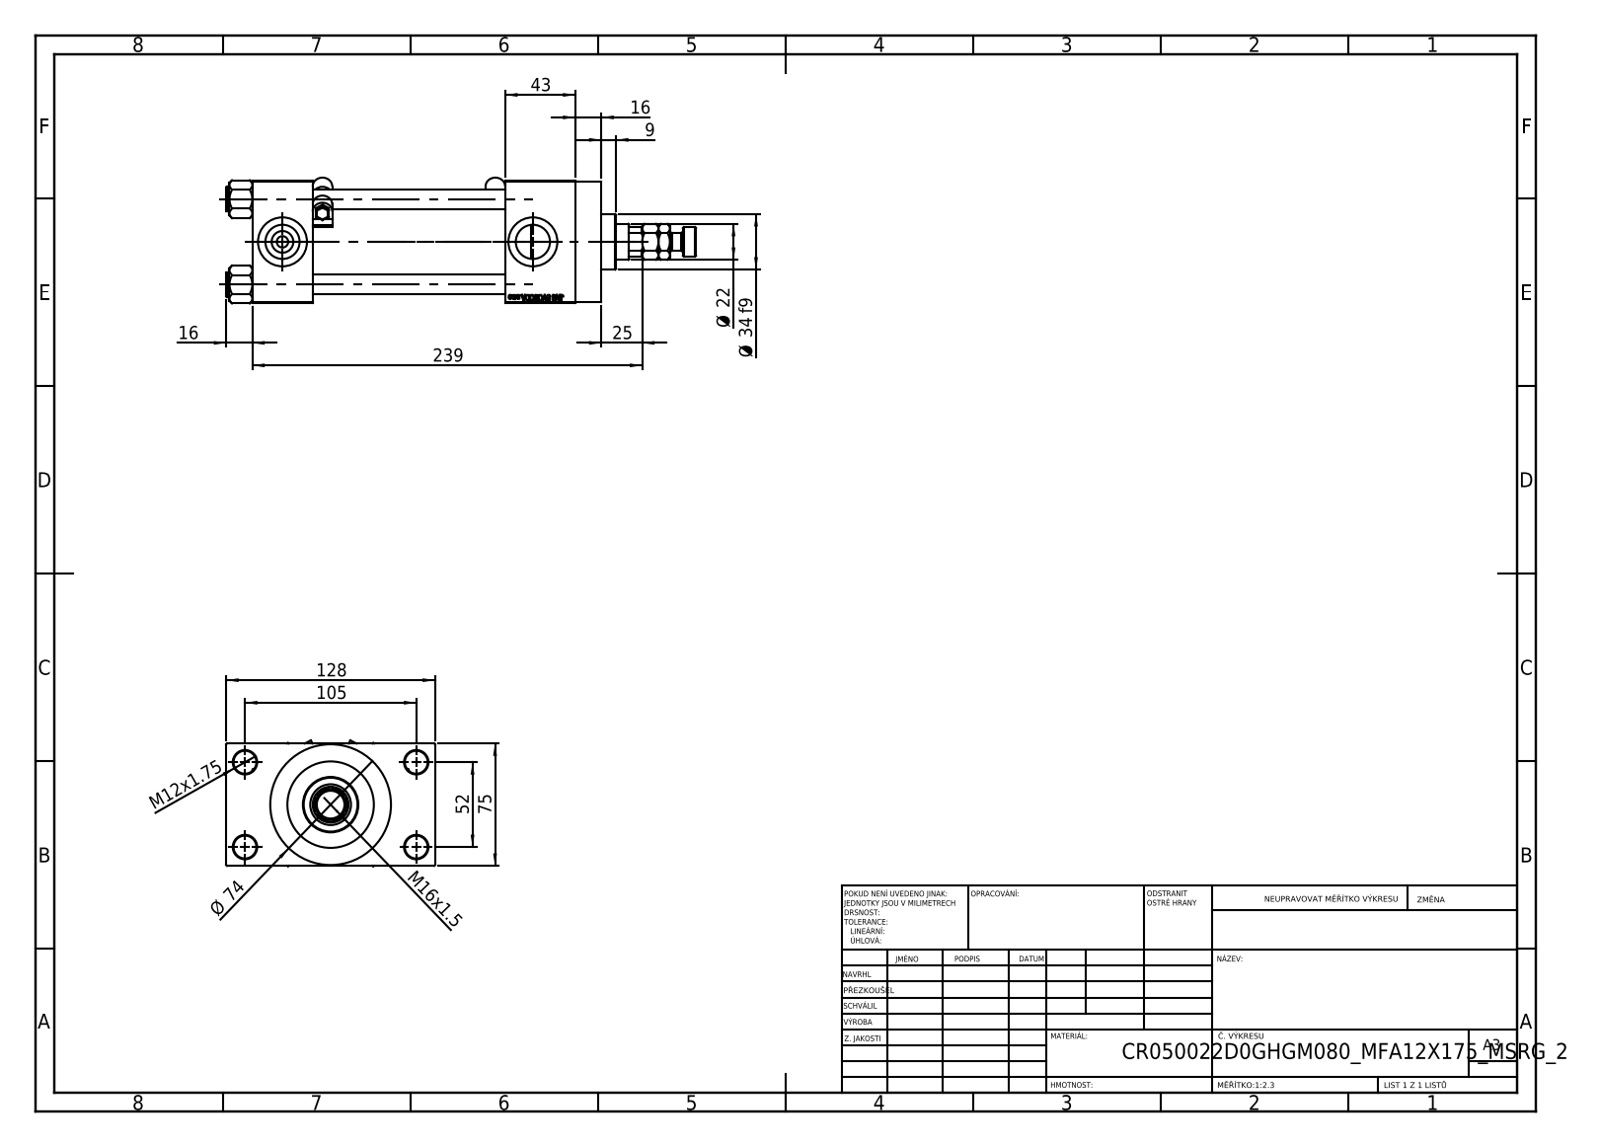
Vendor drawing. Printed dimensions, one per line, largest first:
239
128
105
75
Ø 74
52
43
Ø 34 f9
25
Ø 22
16
16
M16x1.5
M12x1.75
9
